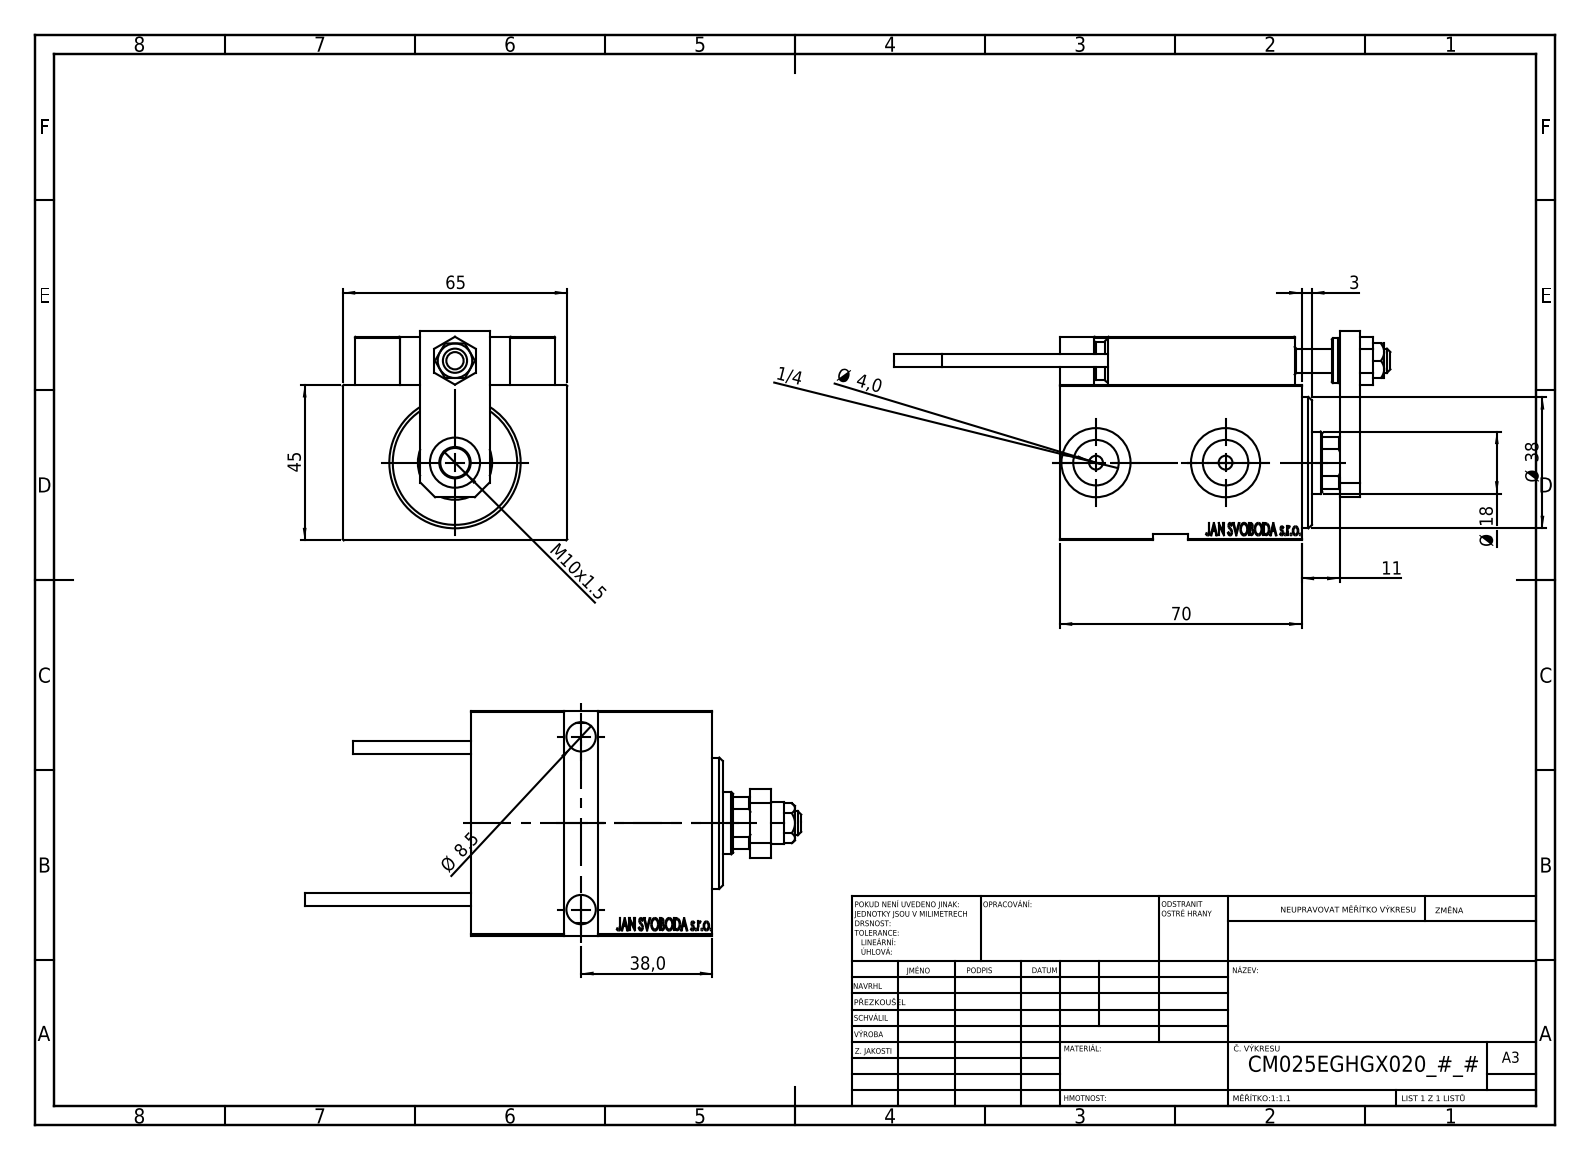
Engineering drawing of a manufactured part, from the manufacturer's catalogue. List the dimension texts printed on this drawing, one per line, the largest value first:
70
65
45
Ø 38
38,0
Ø 18
11
M10x1.5
Ø 8,5
Ø 4,0
3
1/4
